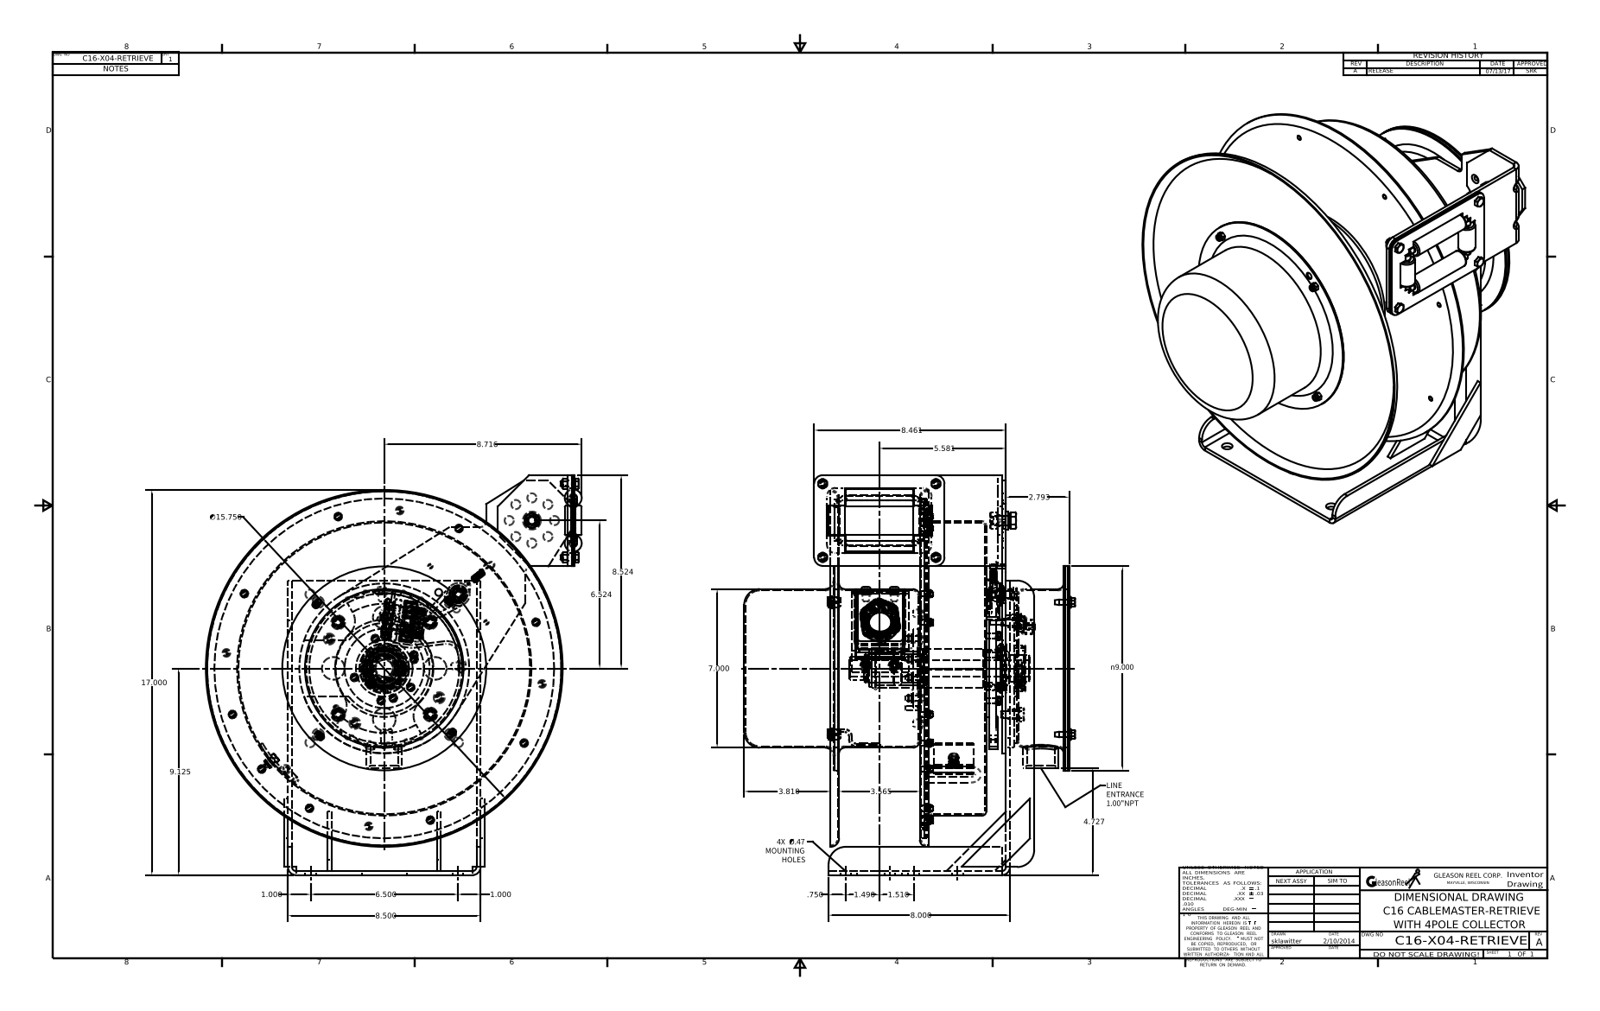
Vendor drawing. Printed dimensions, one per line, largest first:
17.000
∅15.750
9.125
n9.000
8.716
8.524
8.500
8.461
8.000
7.000
6.524
6.500
5.581
4.727
3.810
3.565
2.793
1.510
1.490
1.000
1.000
.750
